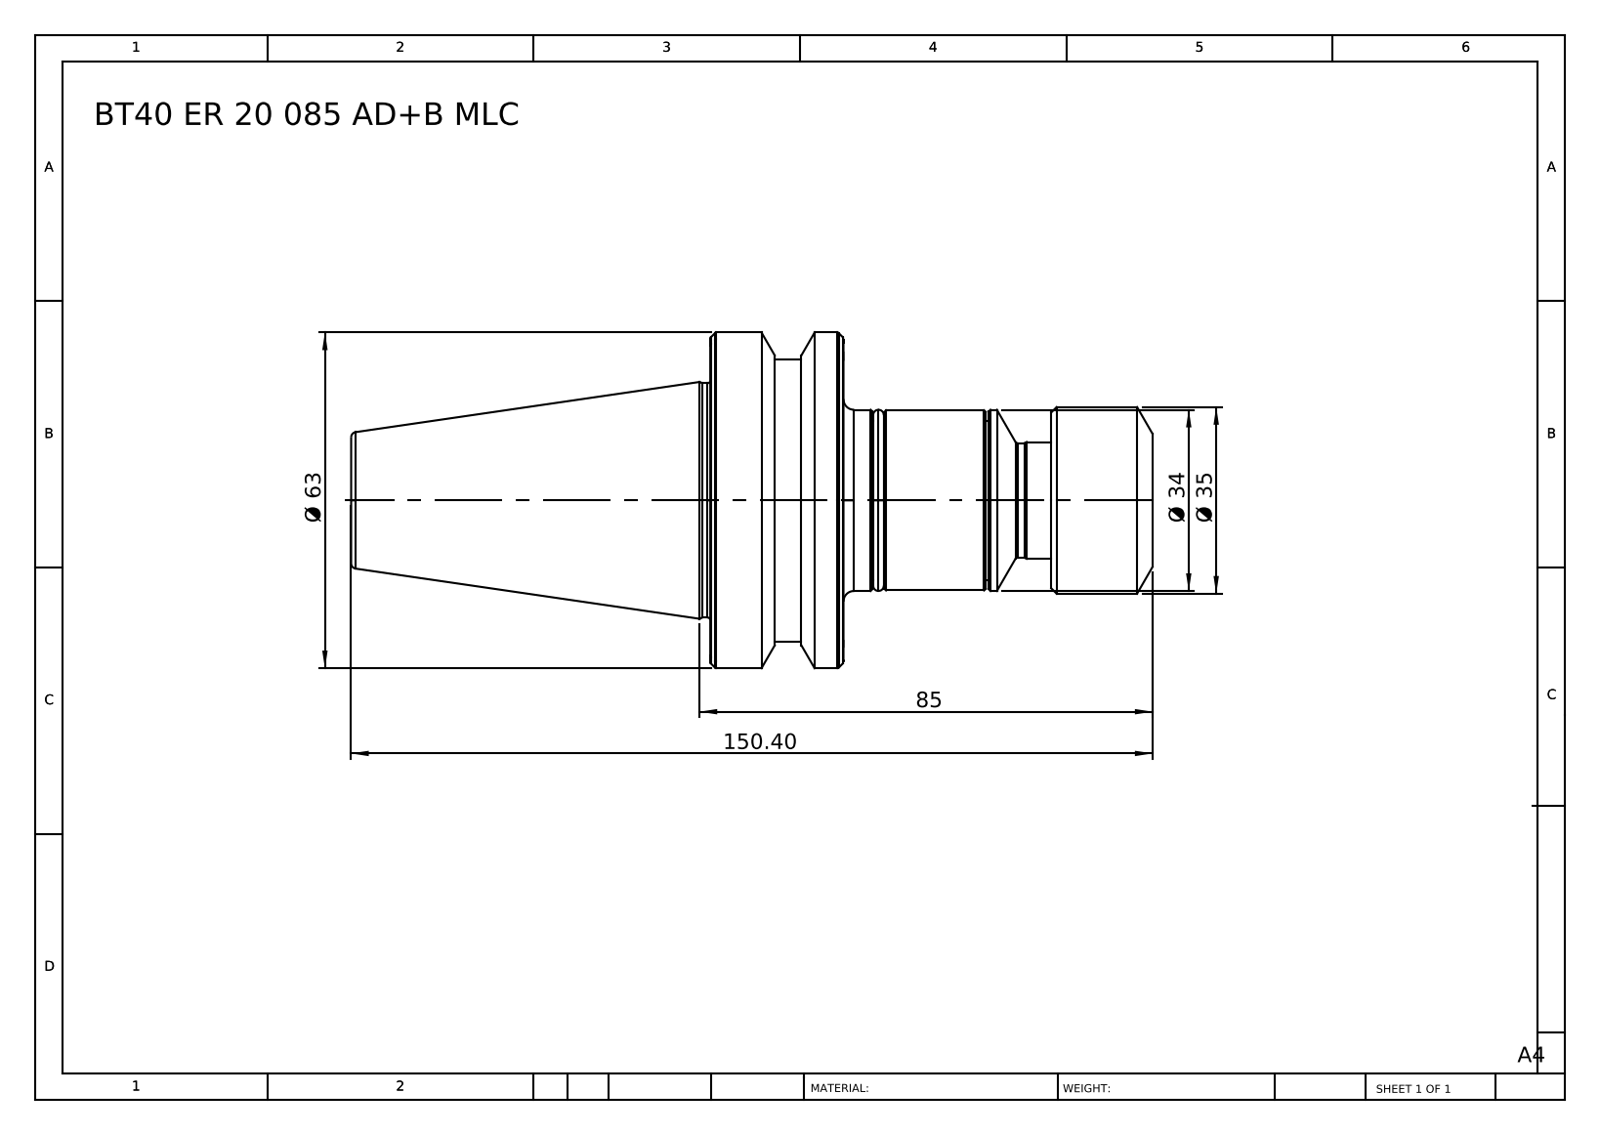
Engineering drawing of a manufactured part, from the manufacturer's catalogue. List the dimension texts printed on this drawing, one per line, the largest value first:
150.40
85
Ø 63
Ø 35
Ø 34
